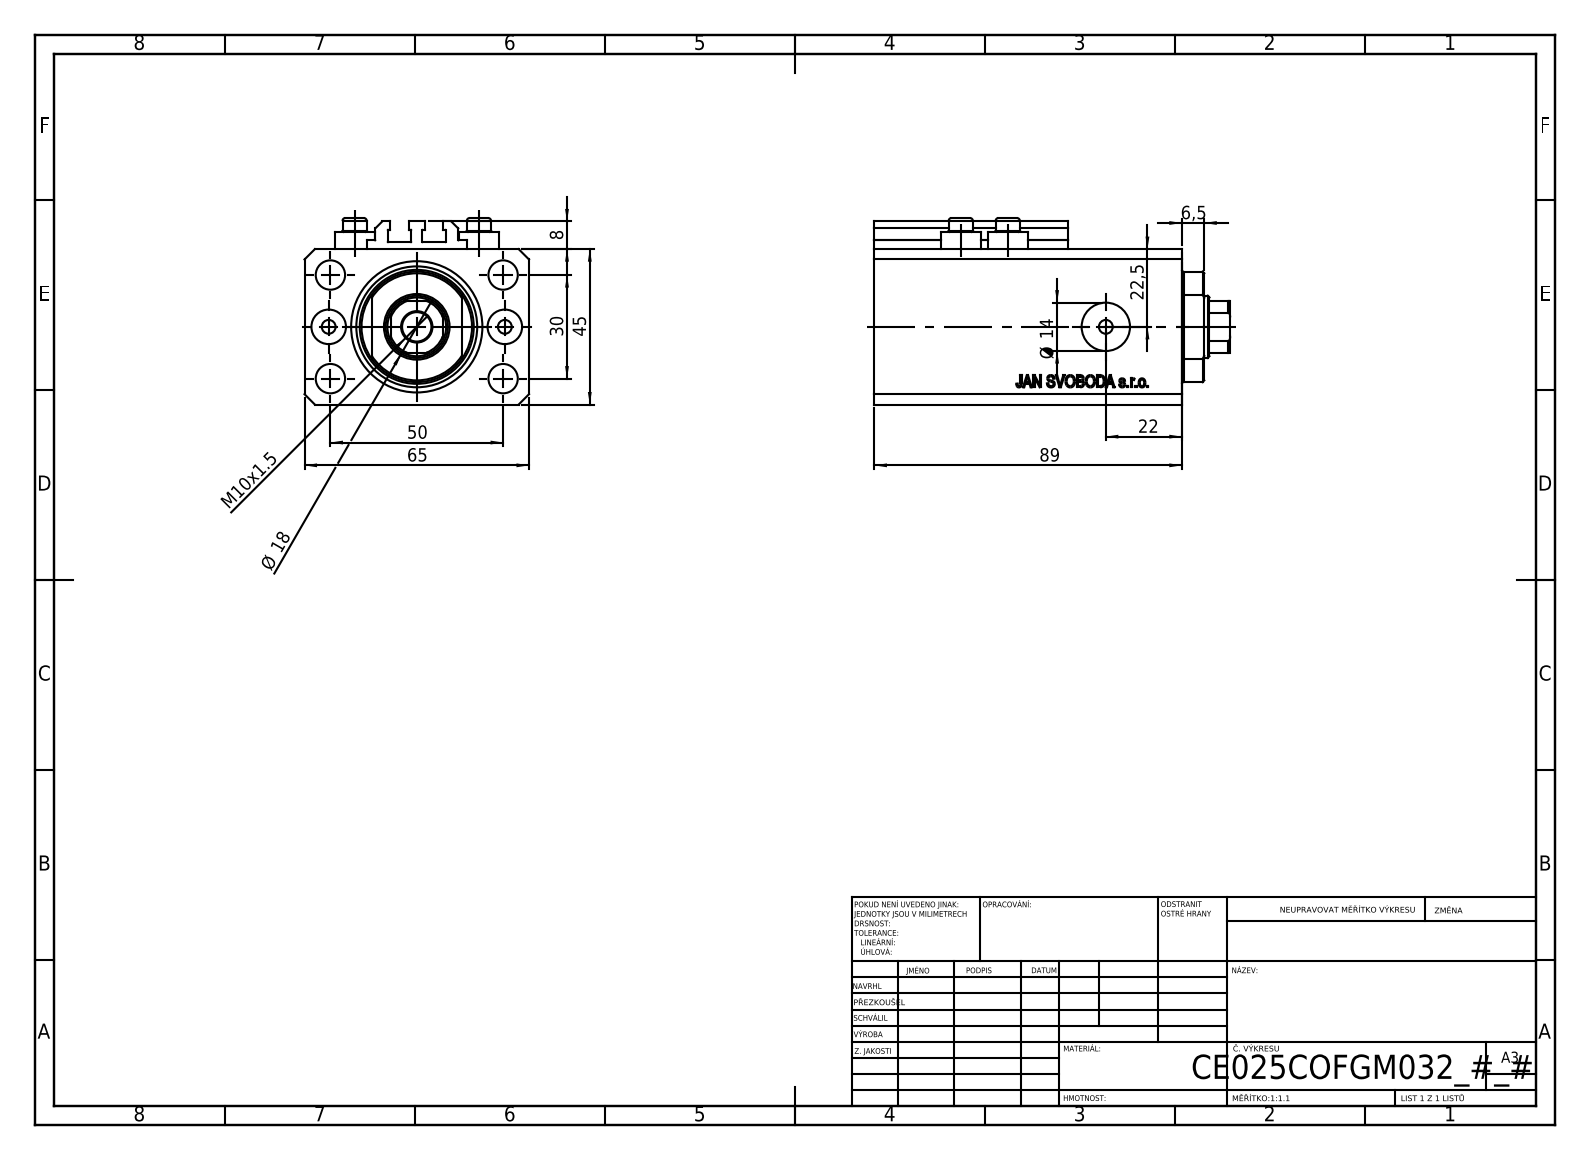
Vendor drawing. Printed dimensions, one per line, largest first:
89
65
50
45
30
22,5
22
Ø 18
Ø 14
M10x1.5
8
6,5
